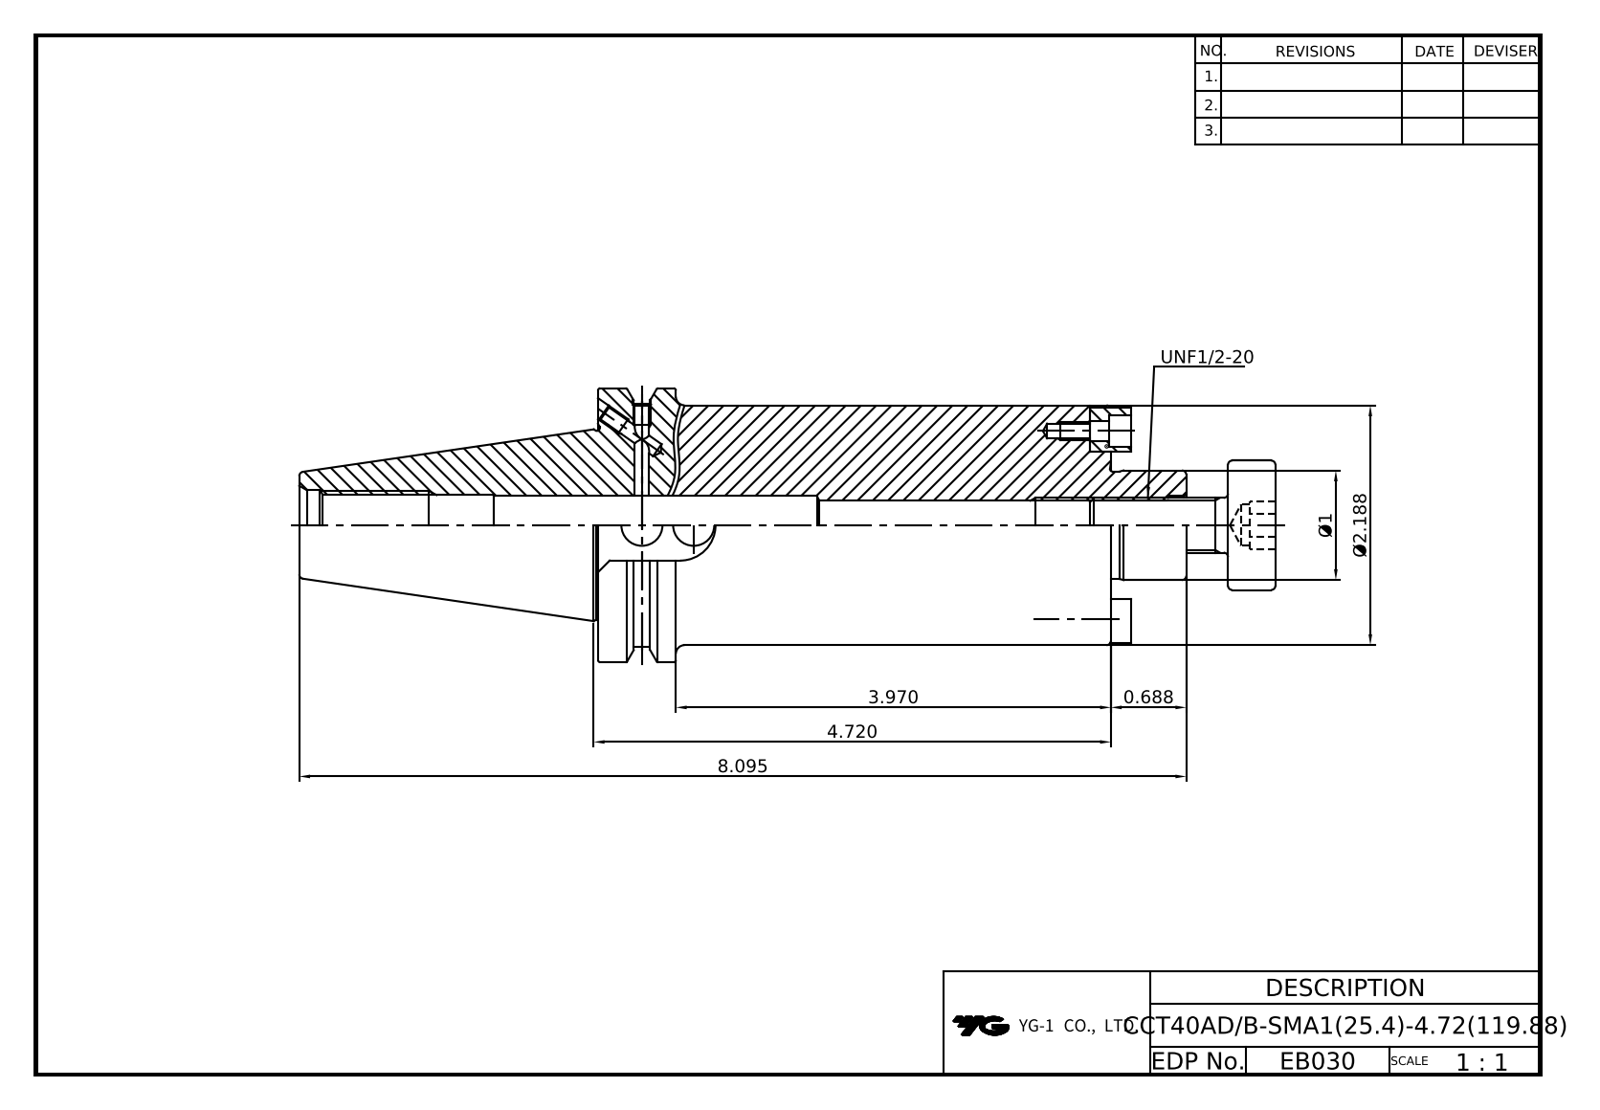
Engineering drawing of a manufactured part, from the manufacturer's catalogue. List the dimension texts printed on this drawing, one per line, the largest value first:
8.095
4.720
3.970
Ø2.188
Ø1
0.688
